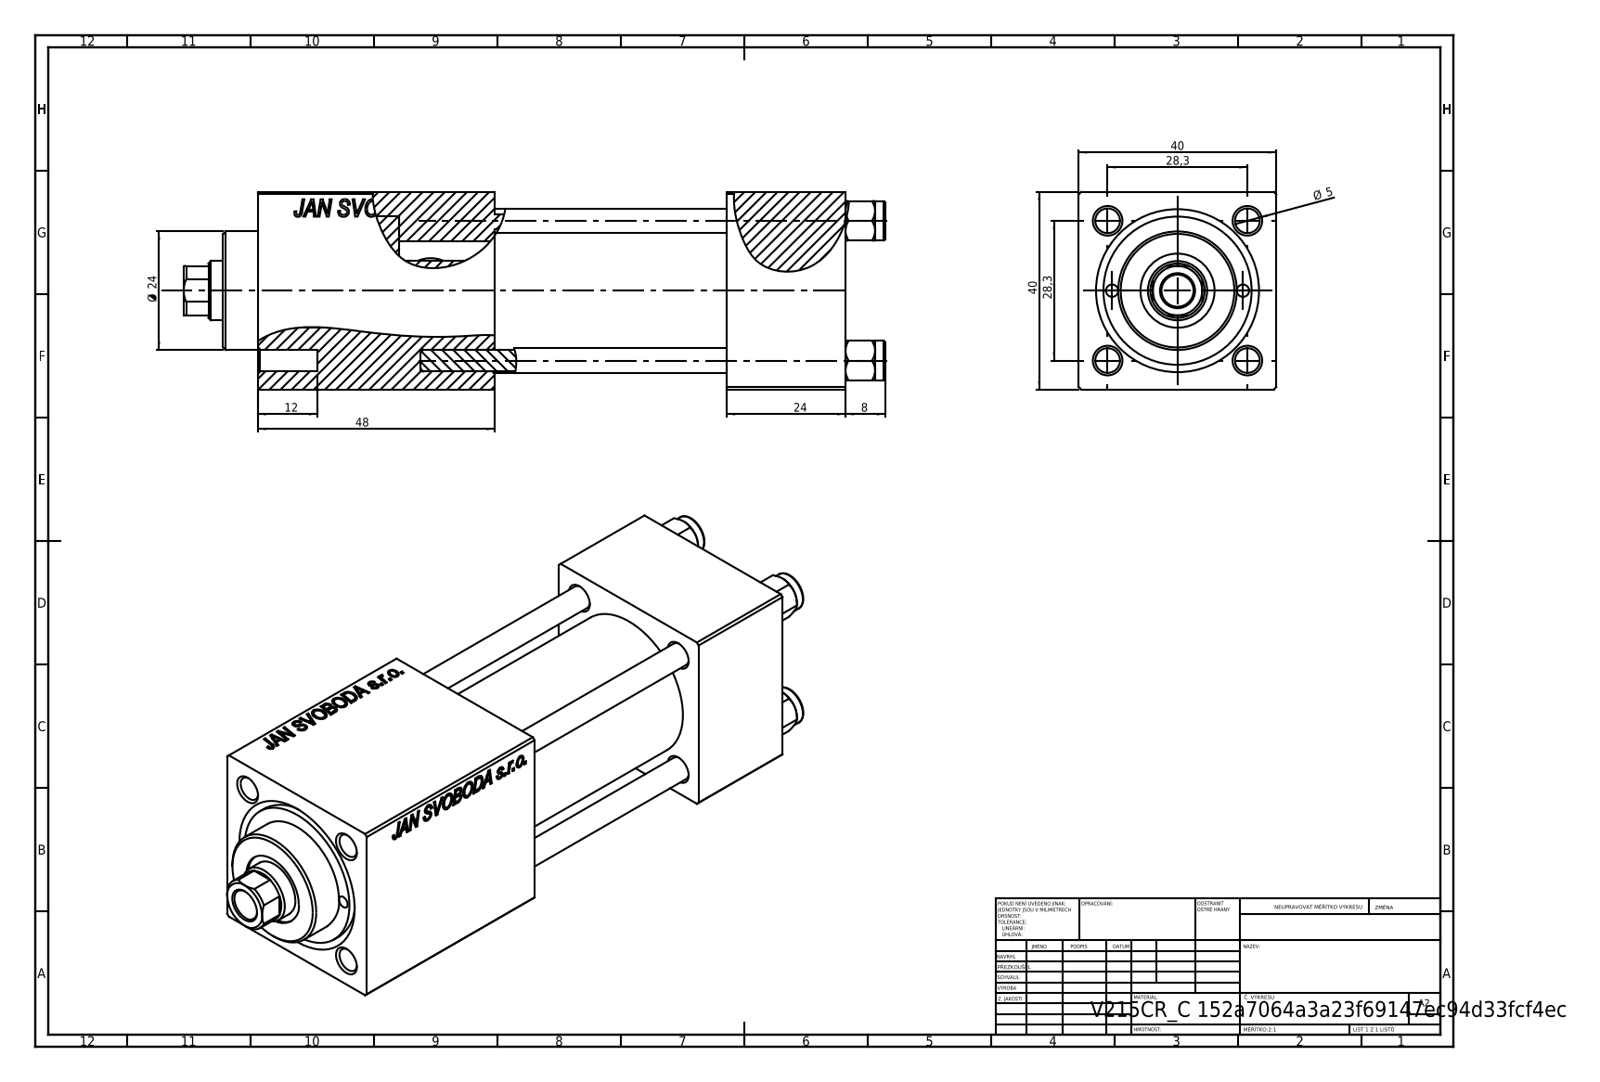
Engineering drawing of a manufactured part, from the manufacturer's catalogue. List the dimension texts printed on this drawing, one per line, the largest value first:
48
40
40
28,3
28,3
24
Ø 24
12
8
Ø 5
